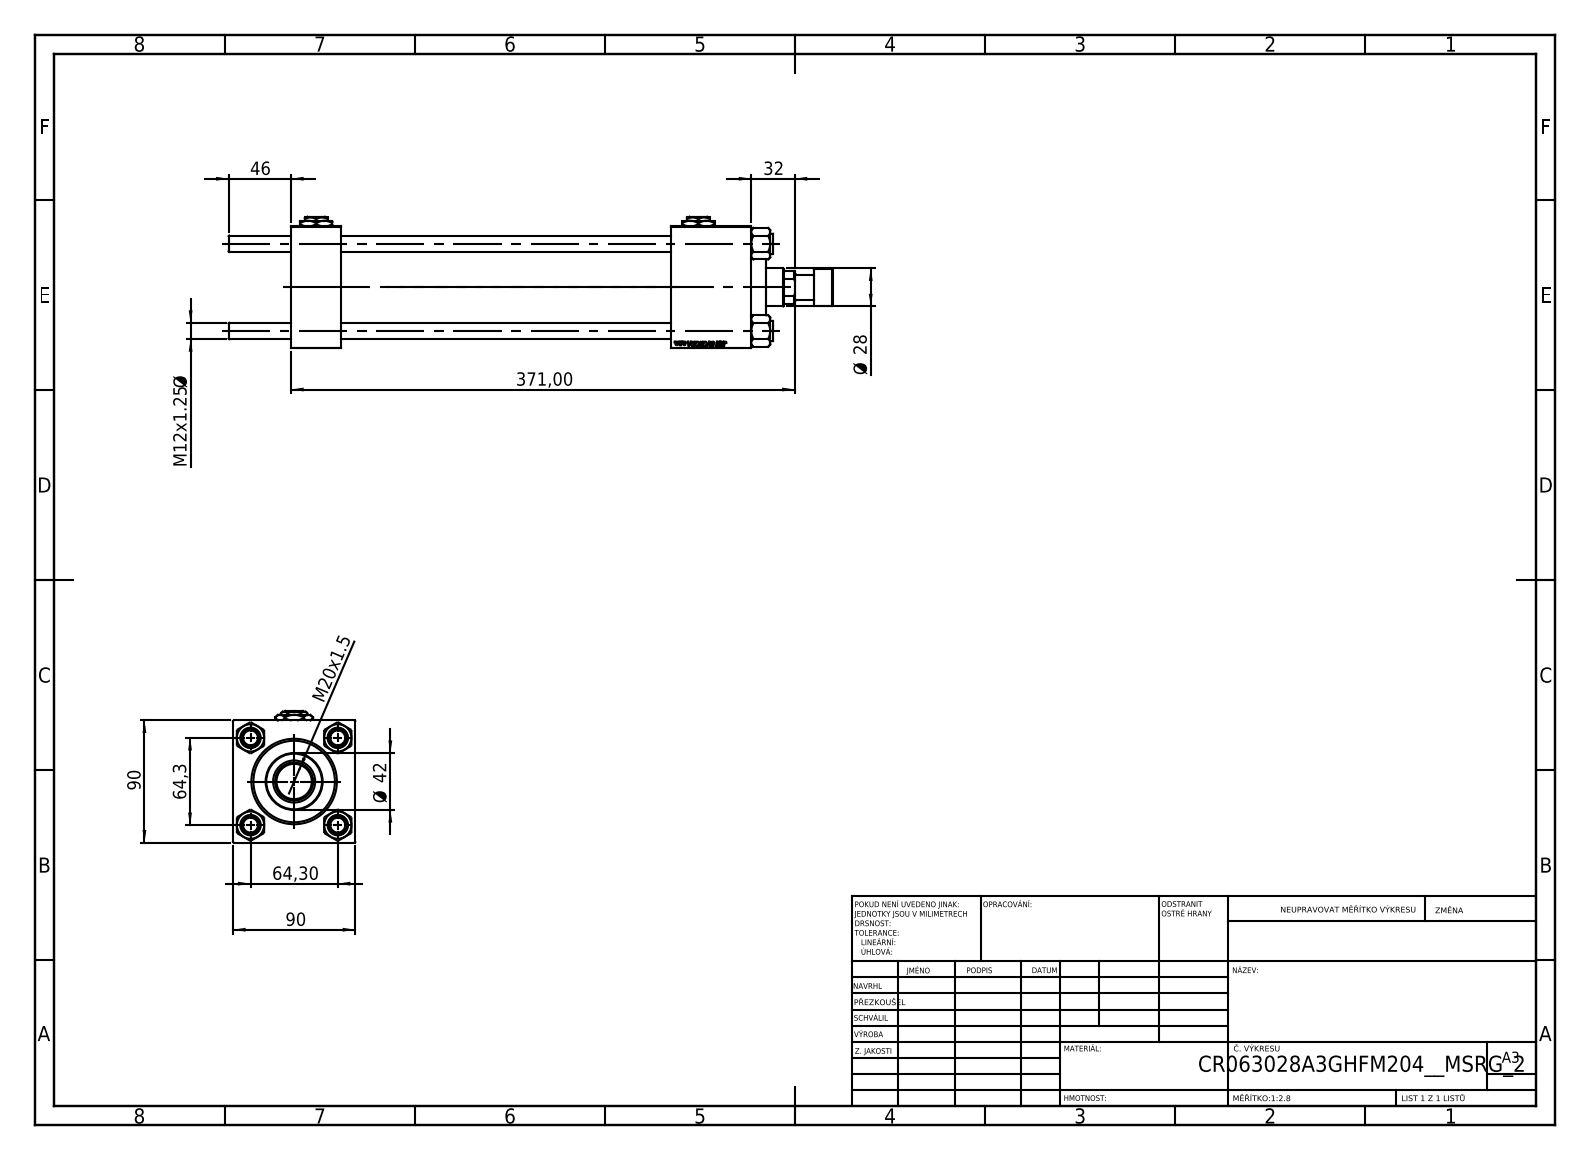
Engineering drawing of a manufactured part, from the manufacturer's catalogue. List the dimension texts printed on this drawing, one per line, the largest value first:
371,00
90
90
64,3
64,30
46
Ø 42
32
Ø 28
M20x1.5
M12x1.25 Ø
